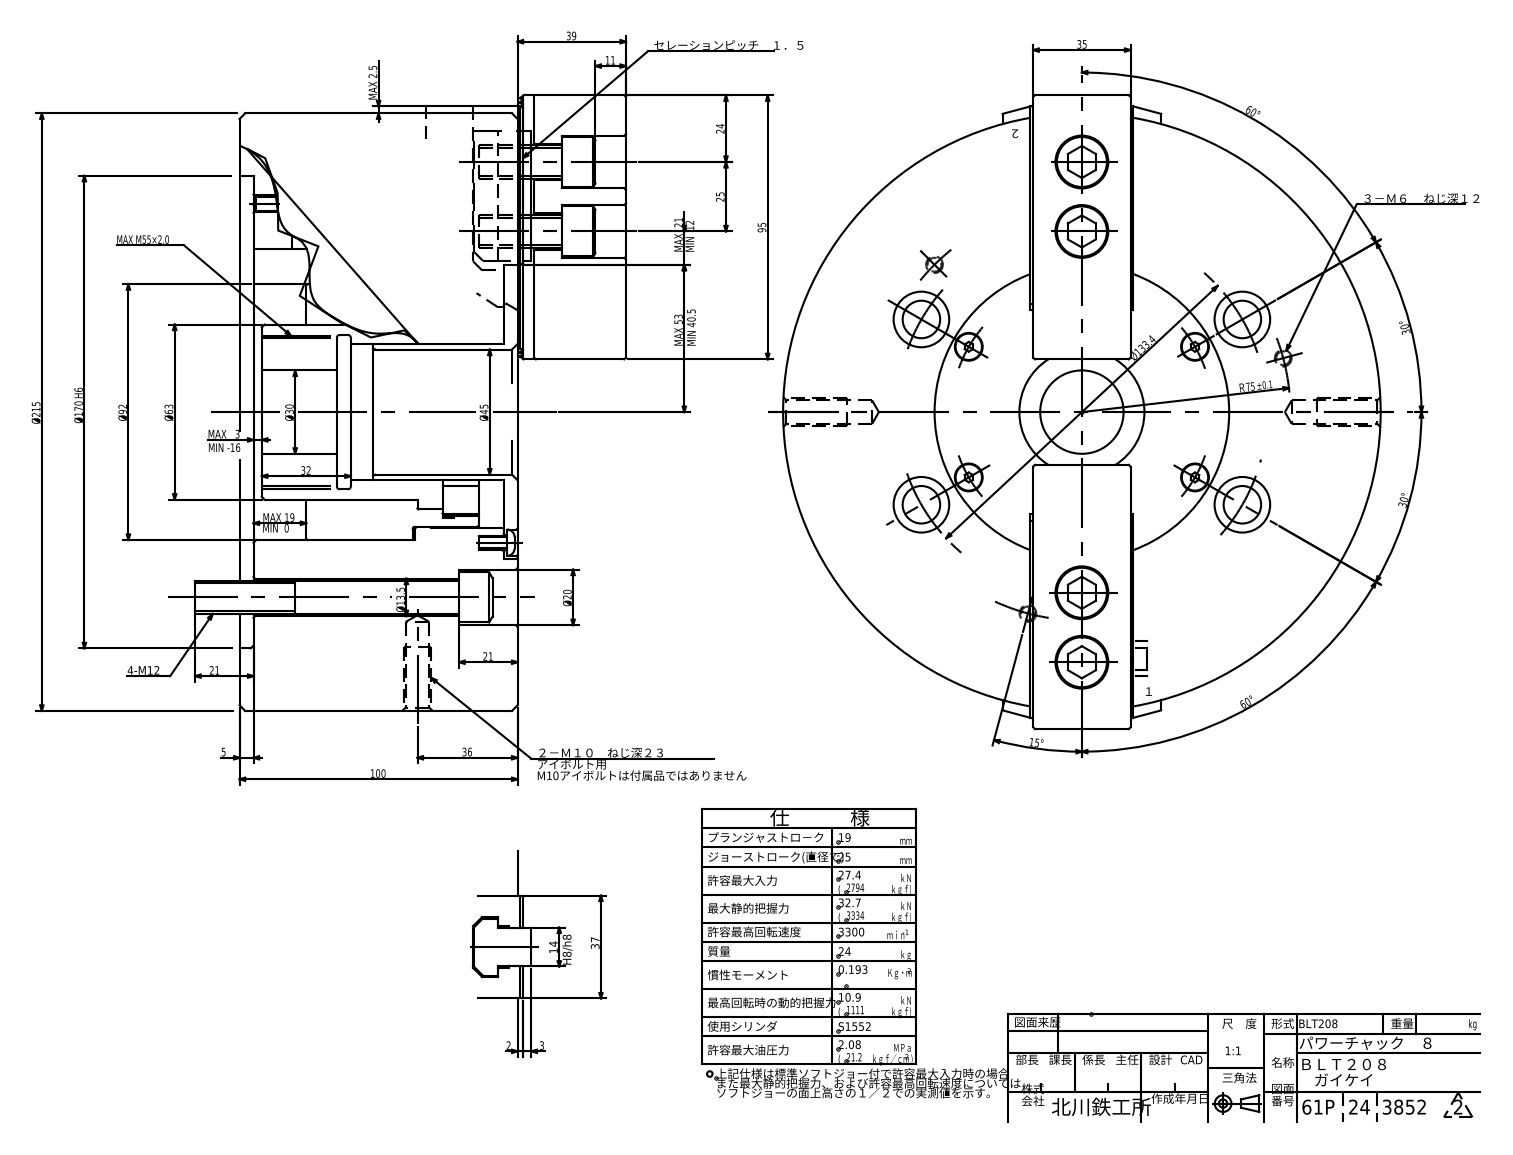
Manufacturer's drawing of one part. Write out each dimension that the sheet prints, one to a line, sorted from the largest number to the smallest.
Ø215
Ø170 H6
Ø133.4
100
95
Ø92
Ｒ75 ±0.1
Ø63
60°
60°
MAX 53
Ø45
39
37
36
35
32
Ø30
30°
30°
25
24
21
MAX 21
21
Ø20
MAX 19
15°
14
Ø13.5
11
5
MAX 3
3
MAX 2.5
2
